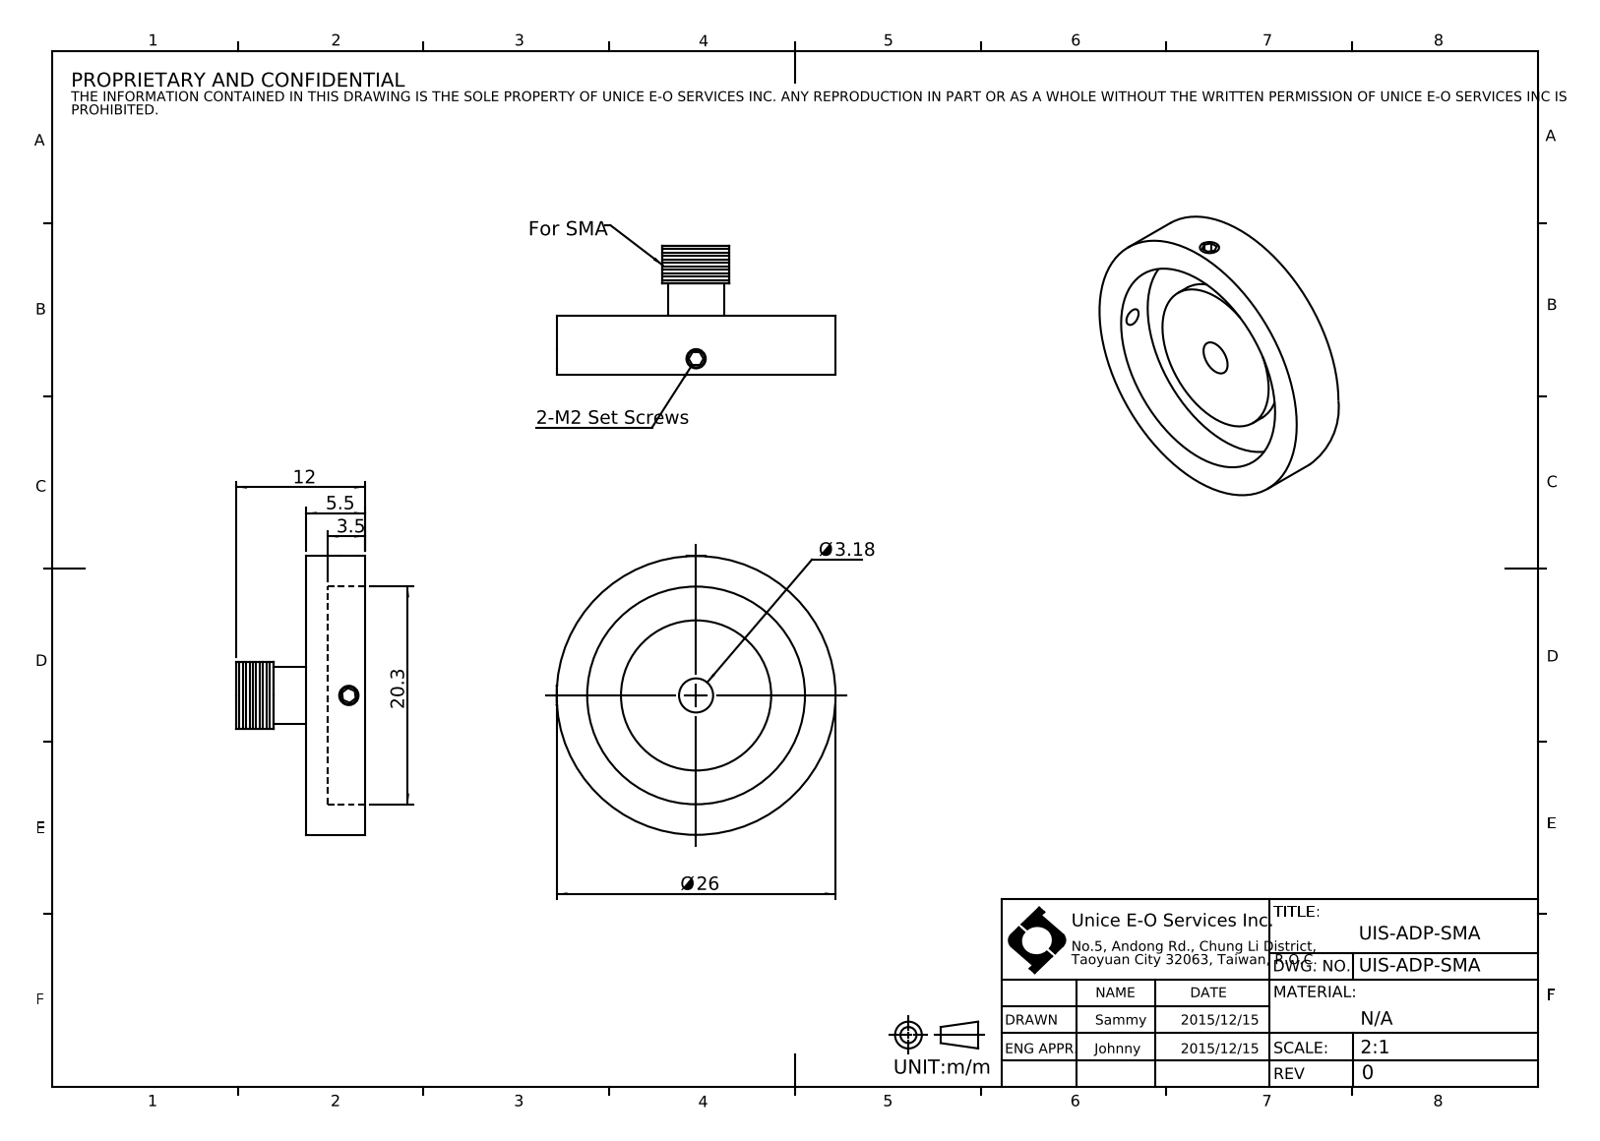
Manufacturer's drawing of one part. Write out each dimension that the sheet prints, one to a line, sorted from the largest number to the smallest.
Ø 26
20.3
12
5.5
3.5
Ø 3.18
2-M2 Set Screws
